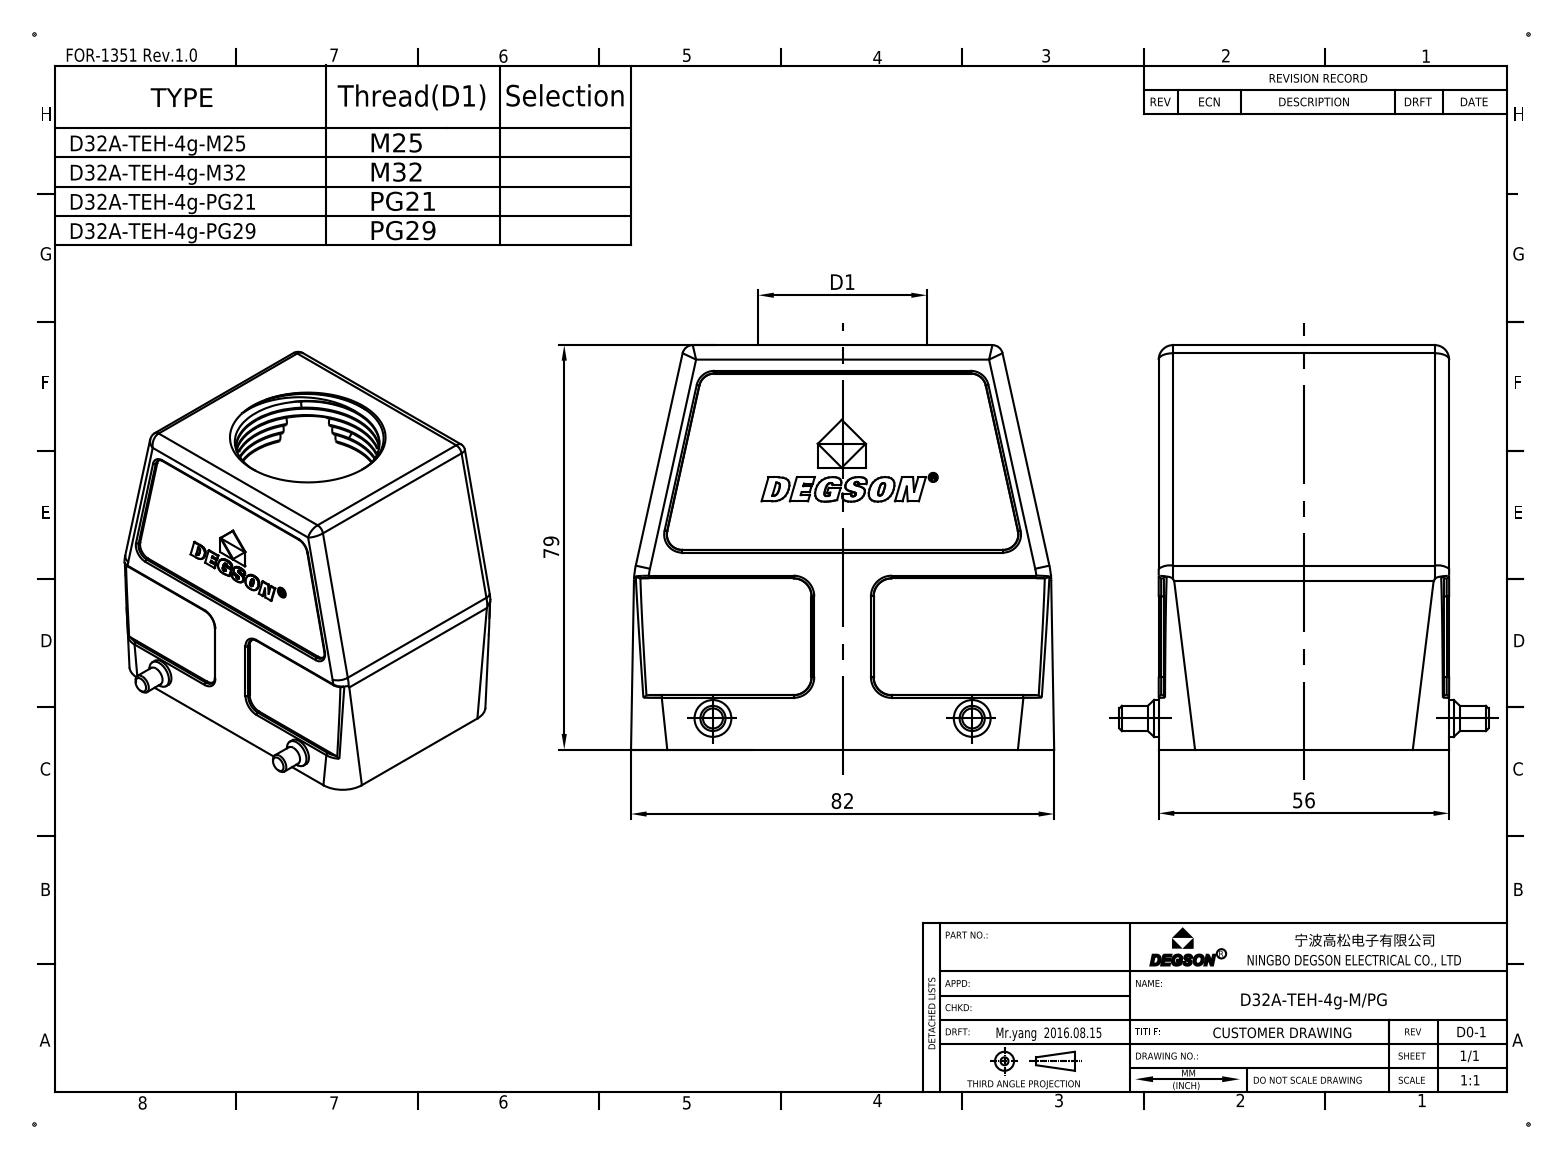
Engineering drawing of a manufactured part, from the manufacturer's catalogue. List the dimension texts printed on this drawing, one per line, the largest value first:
82
79
56
D1
